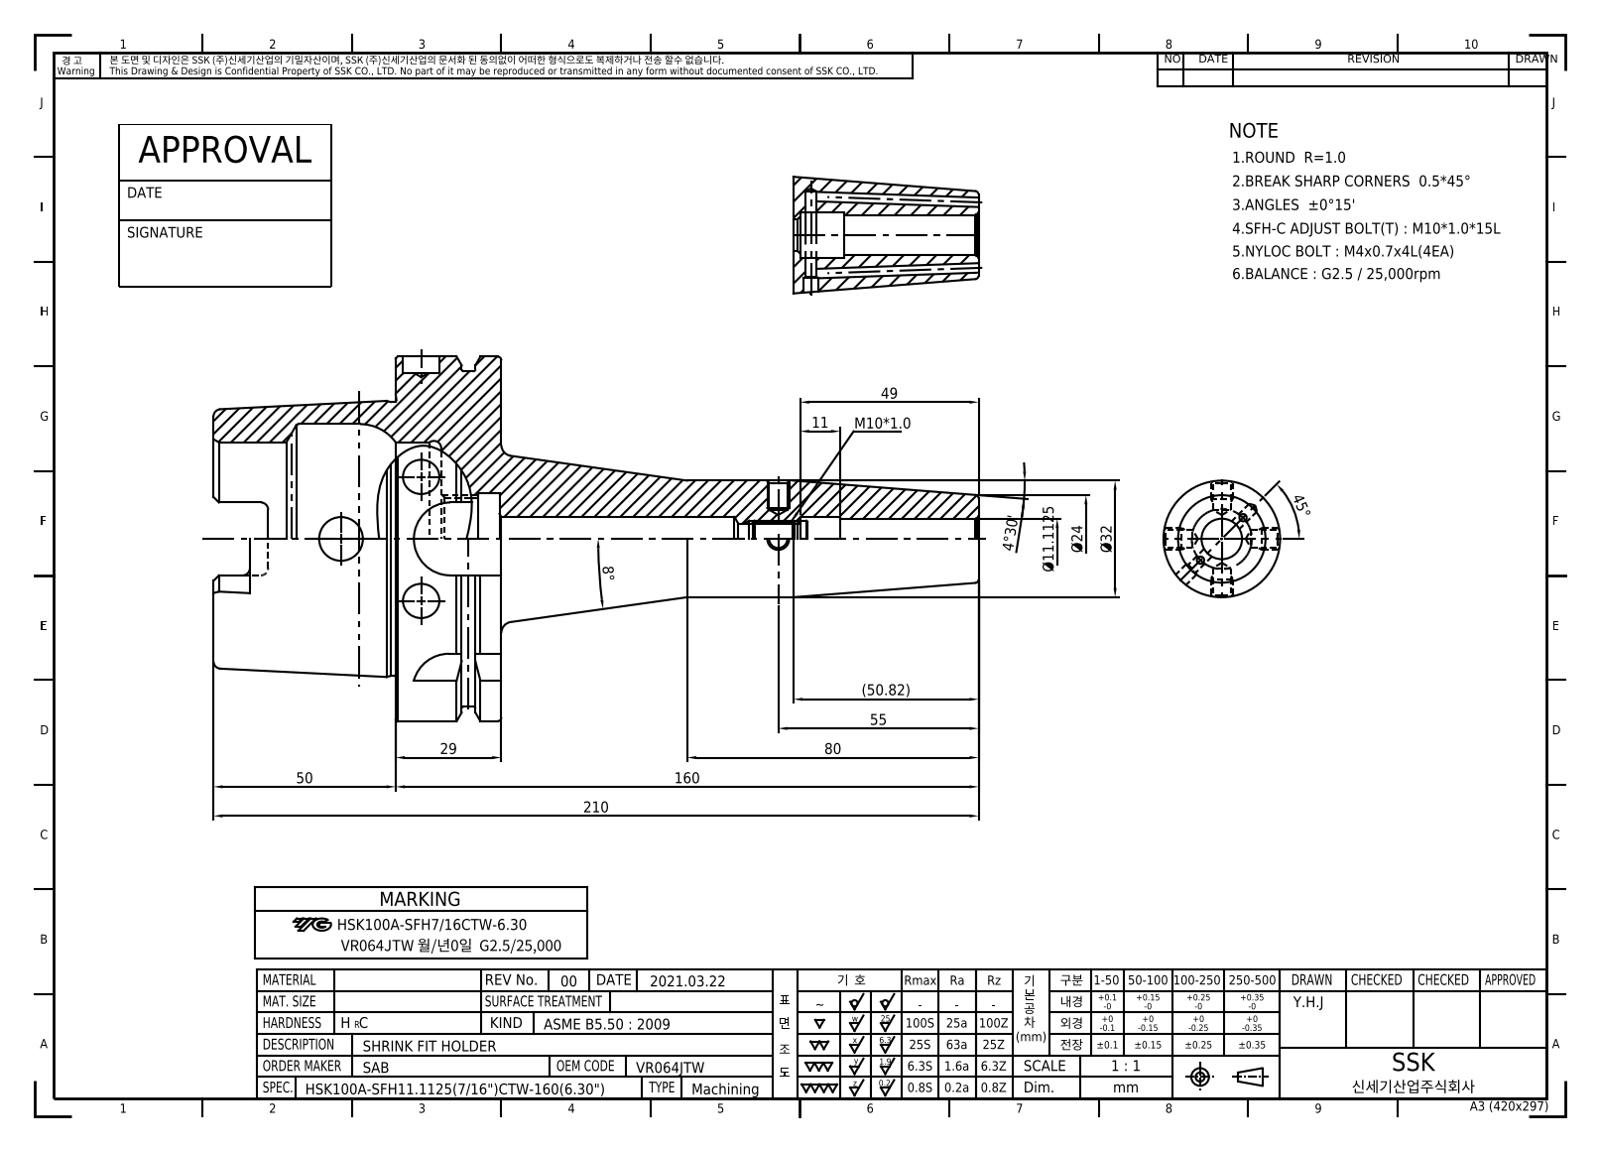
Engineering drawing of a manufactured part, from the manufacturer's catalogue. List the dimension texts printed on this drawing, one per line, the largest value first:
210
160
80
55
(50.82)
50
49
45°
Ø32
29
Ø24
Ø11.1125
11
8°
4°30'
